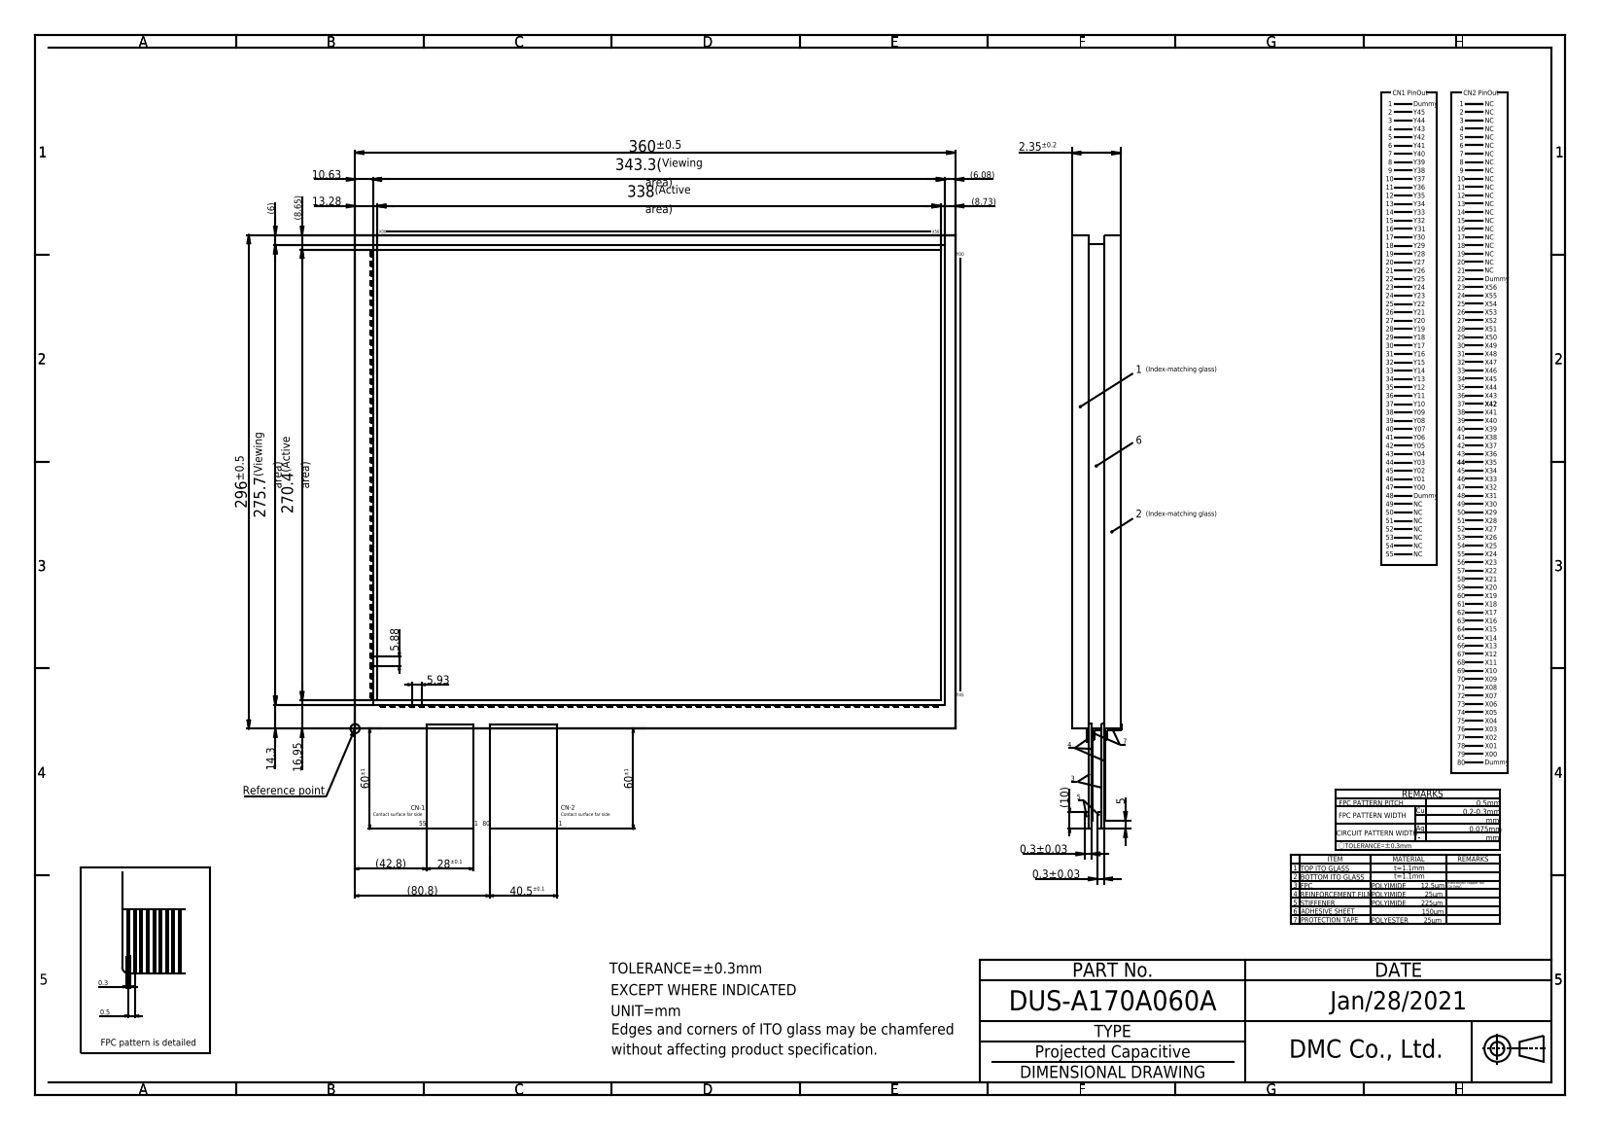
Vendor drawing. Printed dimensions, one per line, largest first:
360±0.5
343.3(Viewing area)
338(Active area)
296±0.5
275.7(Viewing area)
270.4(Active area)
(80.8)
60±1
60±1
(42.8)
40.5±0.1
28±0.1
16.95
14.3
13.28
10.63
(10)
(8.73)
(8.65)
(6.08)
(6)
5.93
5.88
5
2.35±0.2
0.5
0.3
0.3±0.03
0.3±0.03
